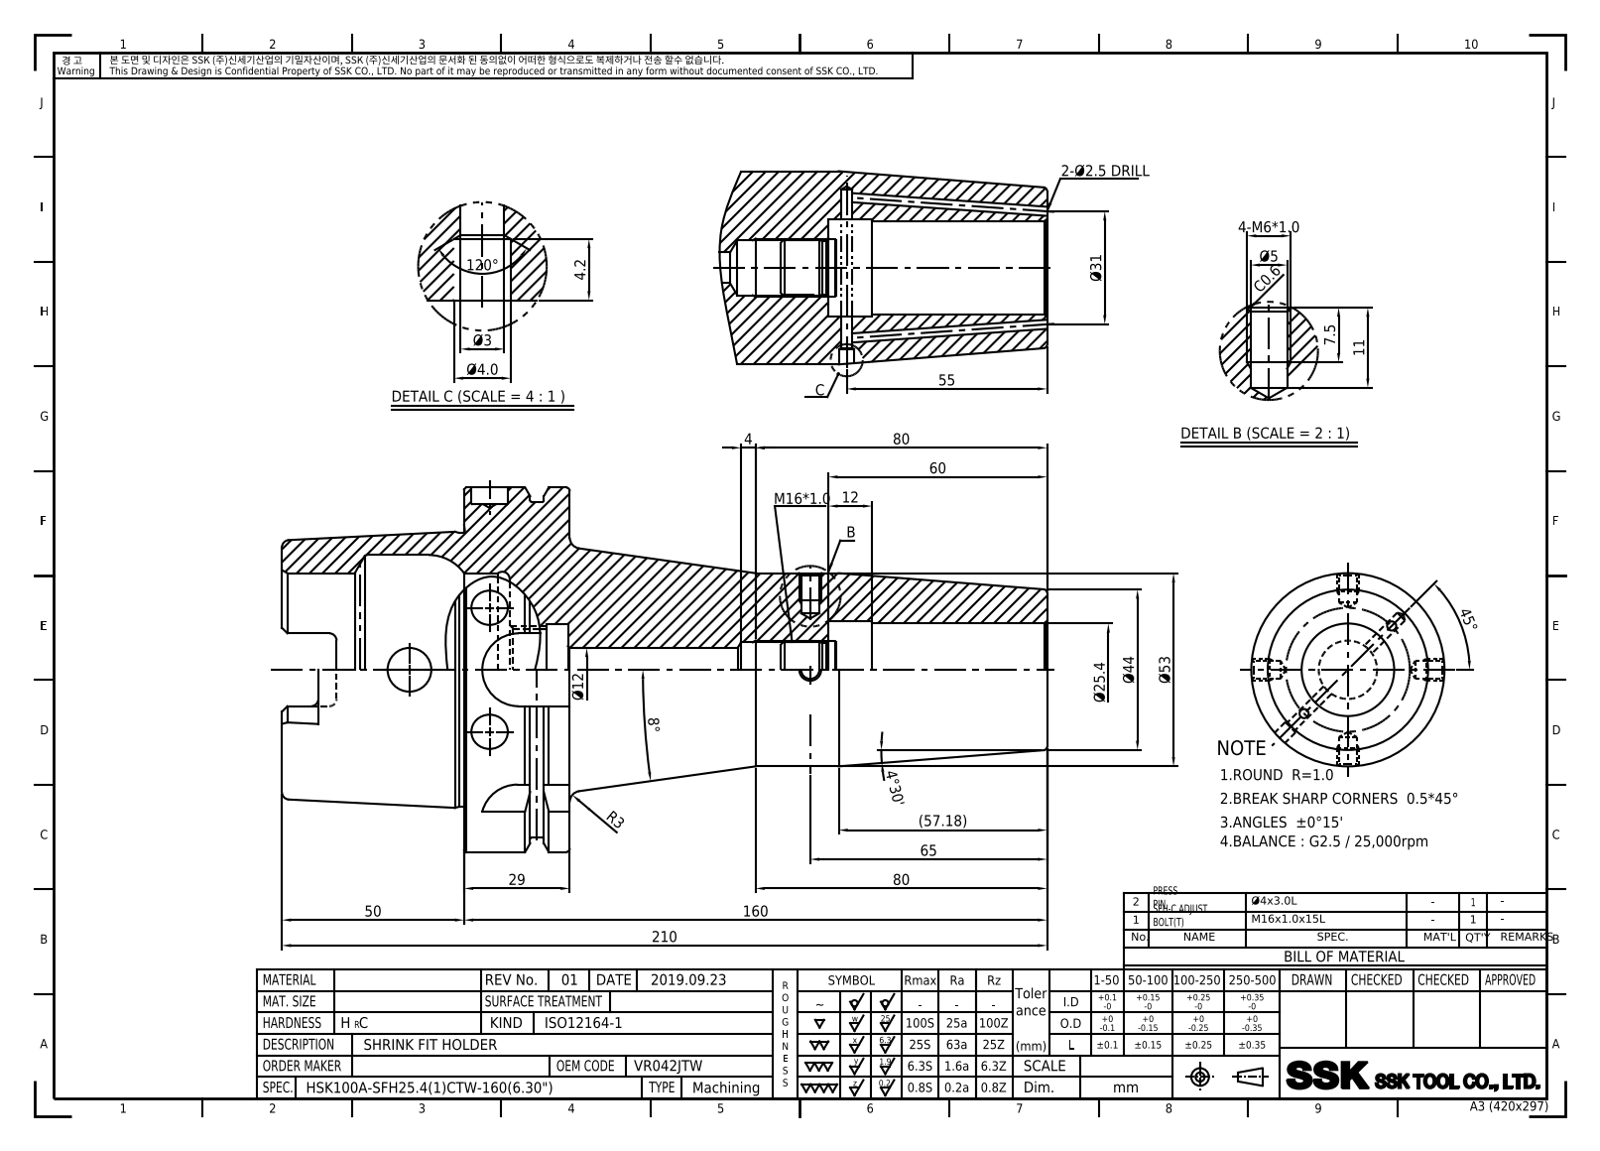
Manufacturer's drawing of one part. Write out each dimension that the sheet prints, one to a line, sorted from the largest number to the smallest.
210
160
120°
80
80
65
60
(57.18)
55
Ø53
50
45°
Ø44
Ø31
29
Ø25.4
Ø12
12
11
8°
7.5
4-M6*1.0
Ø5
4.2
4°30'
Ø4.0
4
Ø3
R3
C0.6
